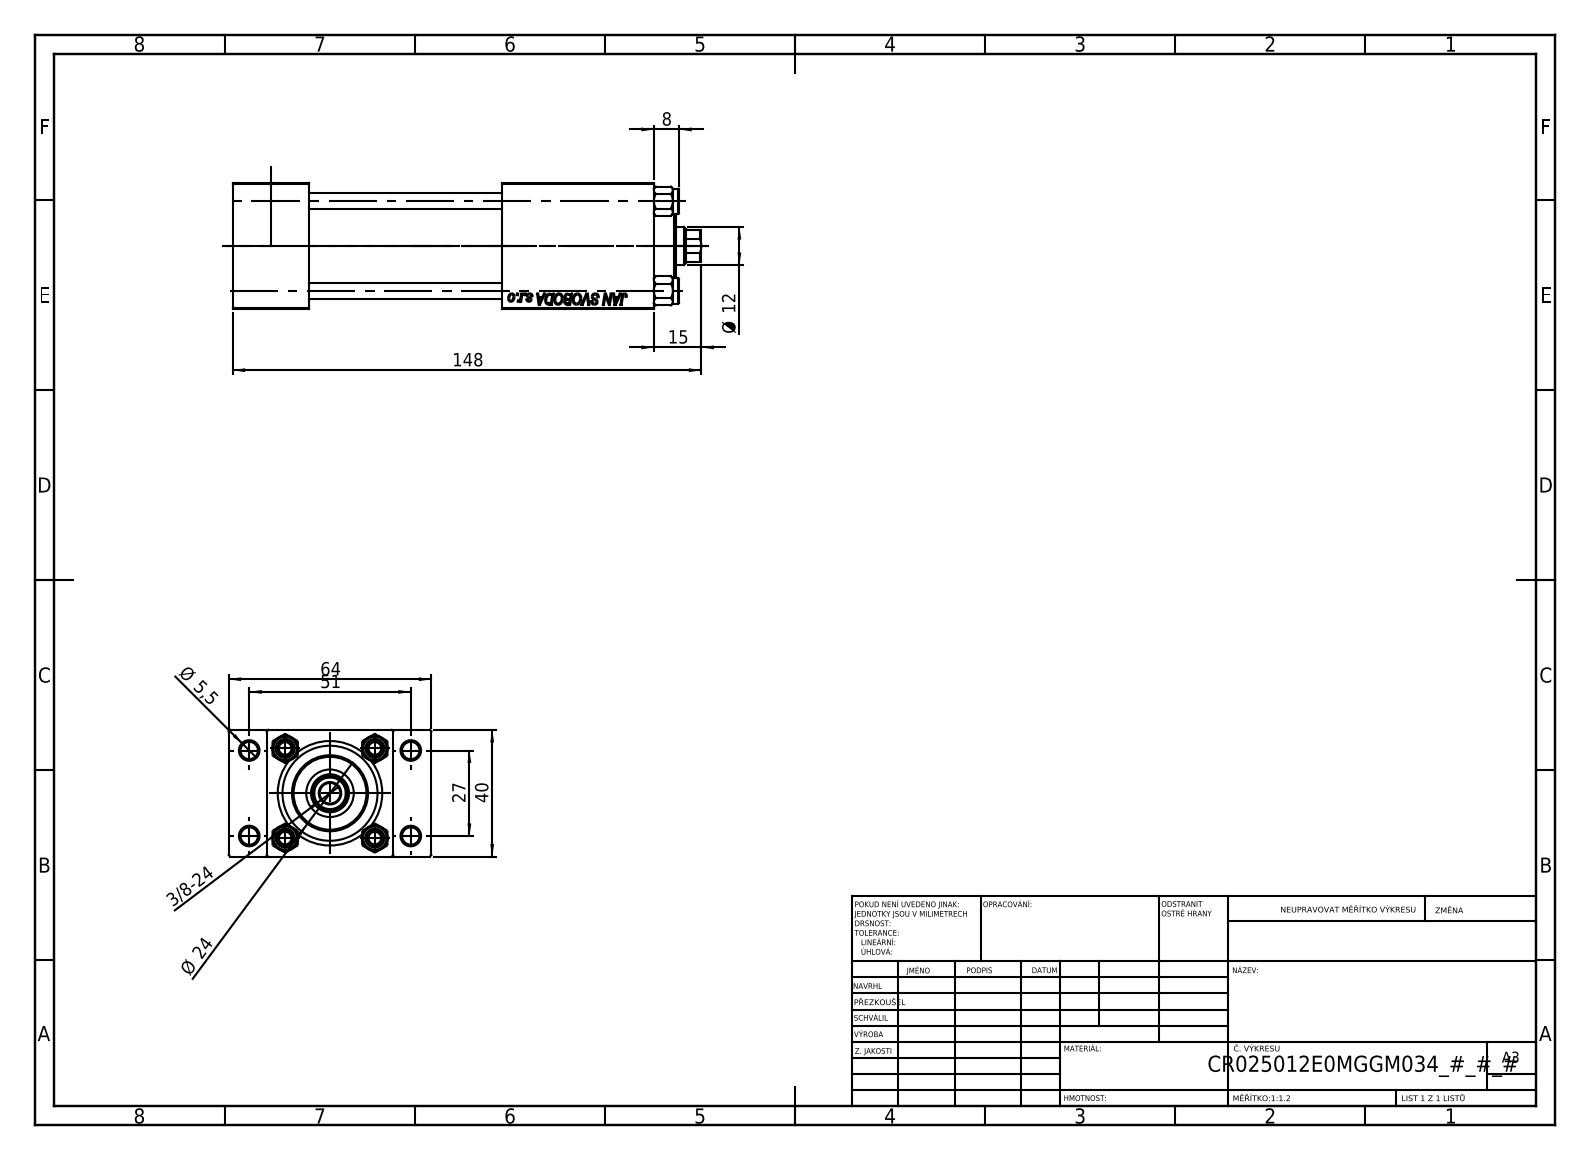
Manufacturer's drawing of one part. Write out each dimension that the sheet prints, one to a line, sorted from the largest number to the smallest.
148
64
51
40
27
Ø 24
15
Ø 12
8
Ø 5,5
3/8-24
